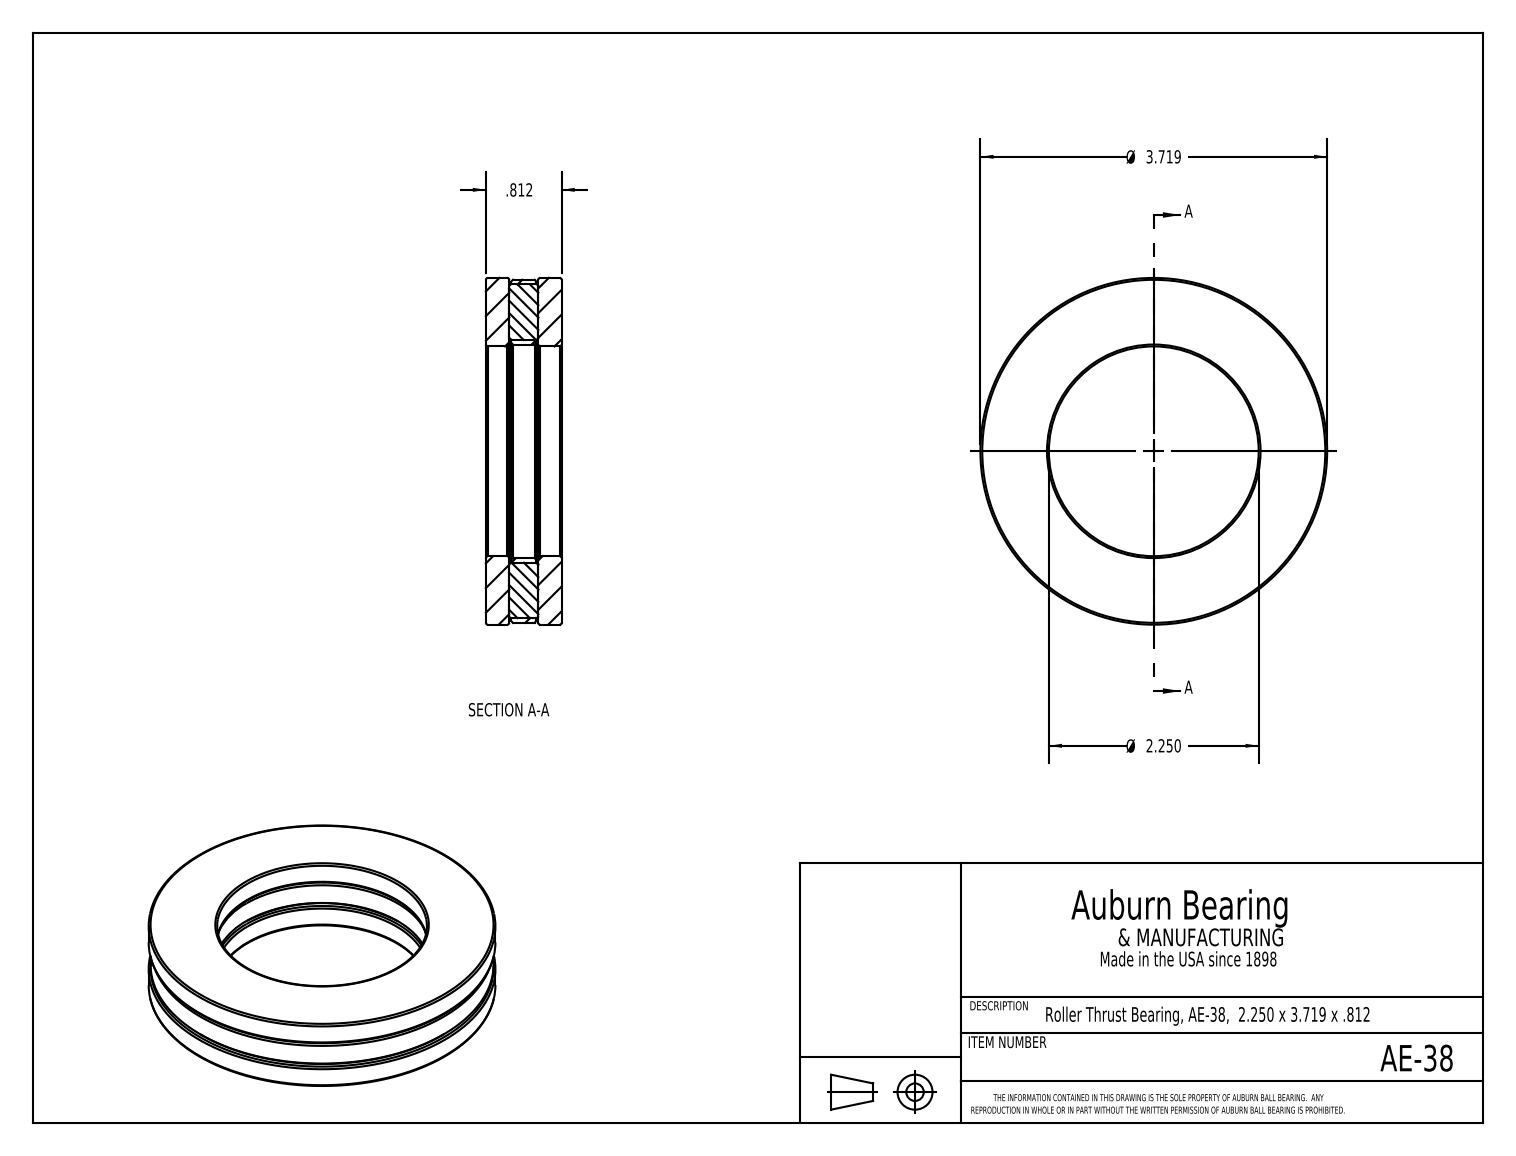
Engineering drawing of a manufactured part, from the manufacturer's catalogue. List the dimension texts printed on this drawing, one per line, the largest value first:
Ø 3.719
Ø 2.250
.812
